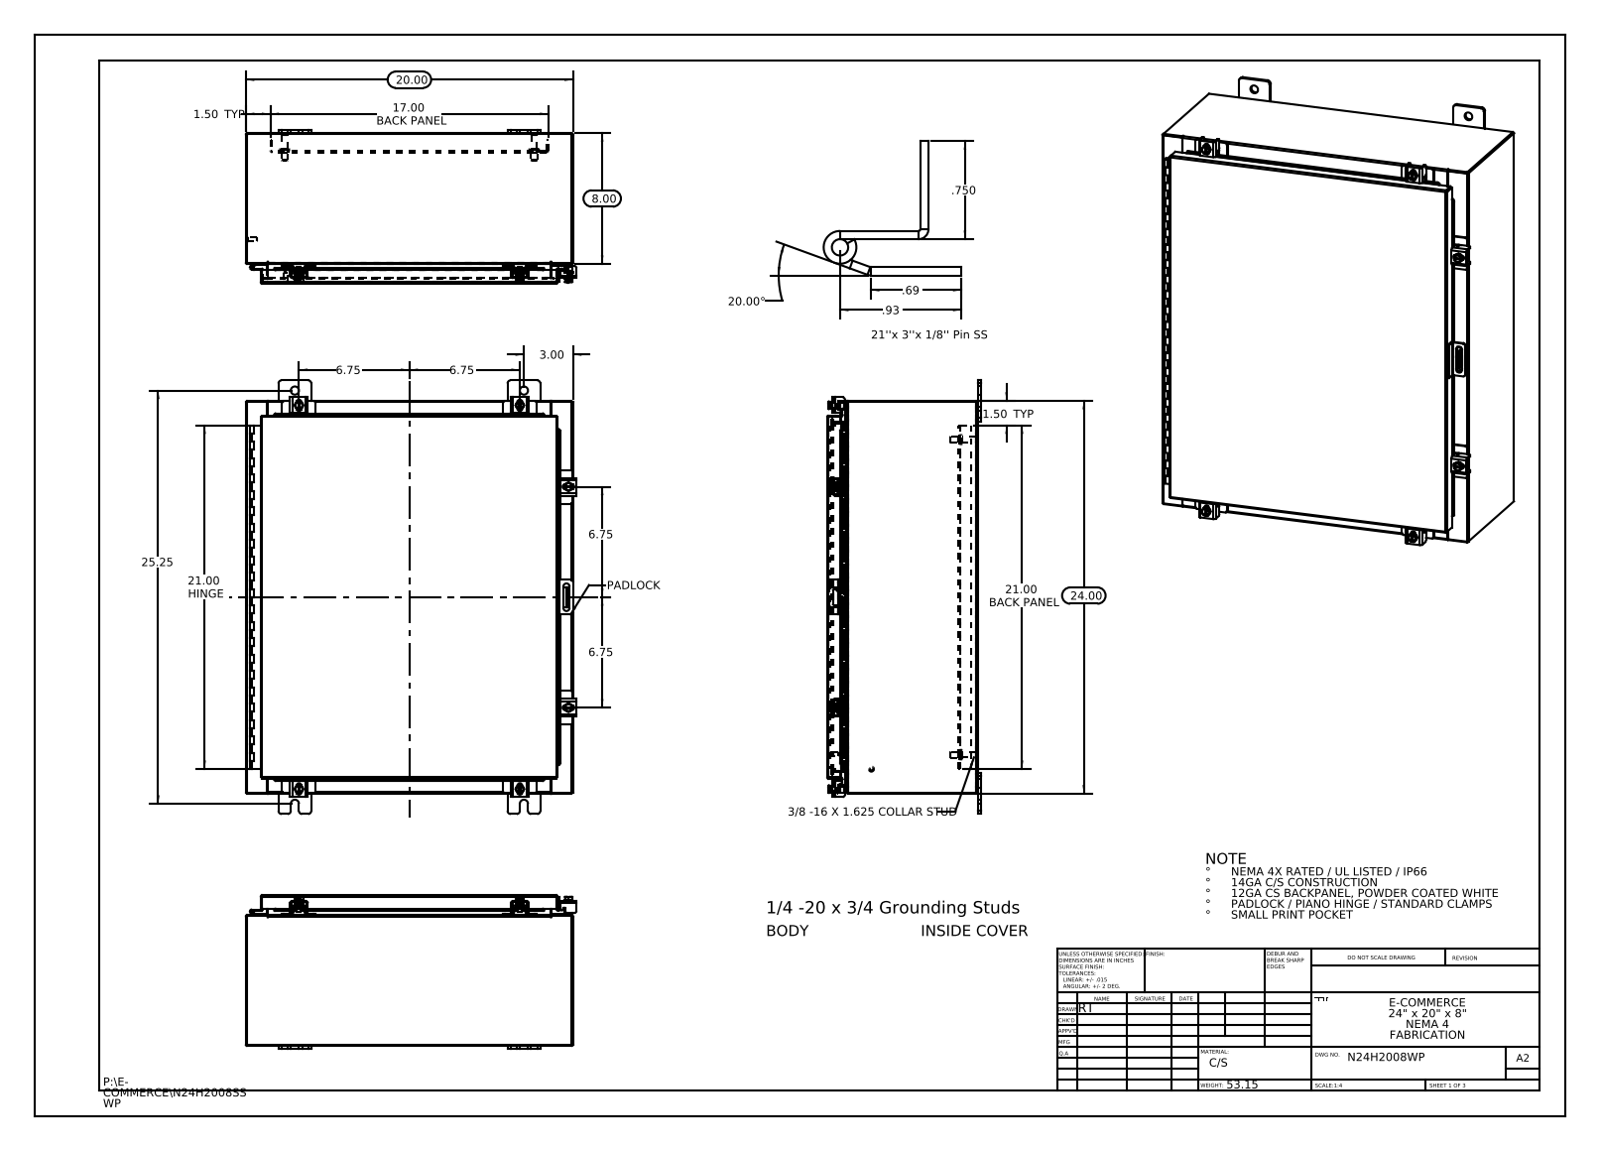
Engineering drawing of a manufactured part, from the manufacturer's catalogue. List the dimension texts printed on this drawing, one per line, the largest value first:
25.25
24.00
21.00 HINGE
21.00 BACK PANEL
20.00
20.00°
17.00 BACK PANEL
8.00
6.75
6.75
6.75
6.75
3.00
1.50 TYP
1.50 TYP
.93
.750
.69
